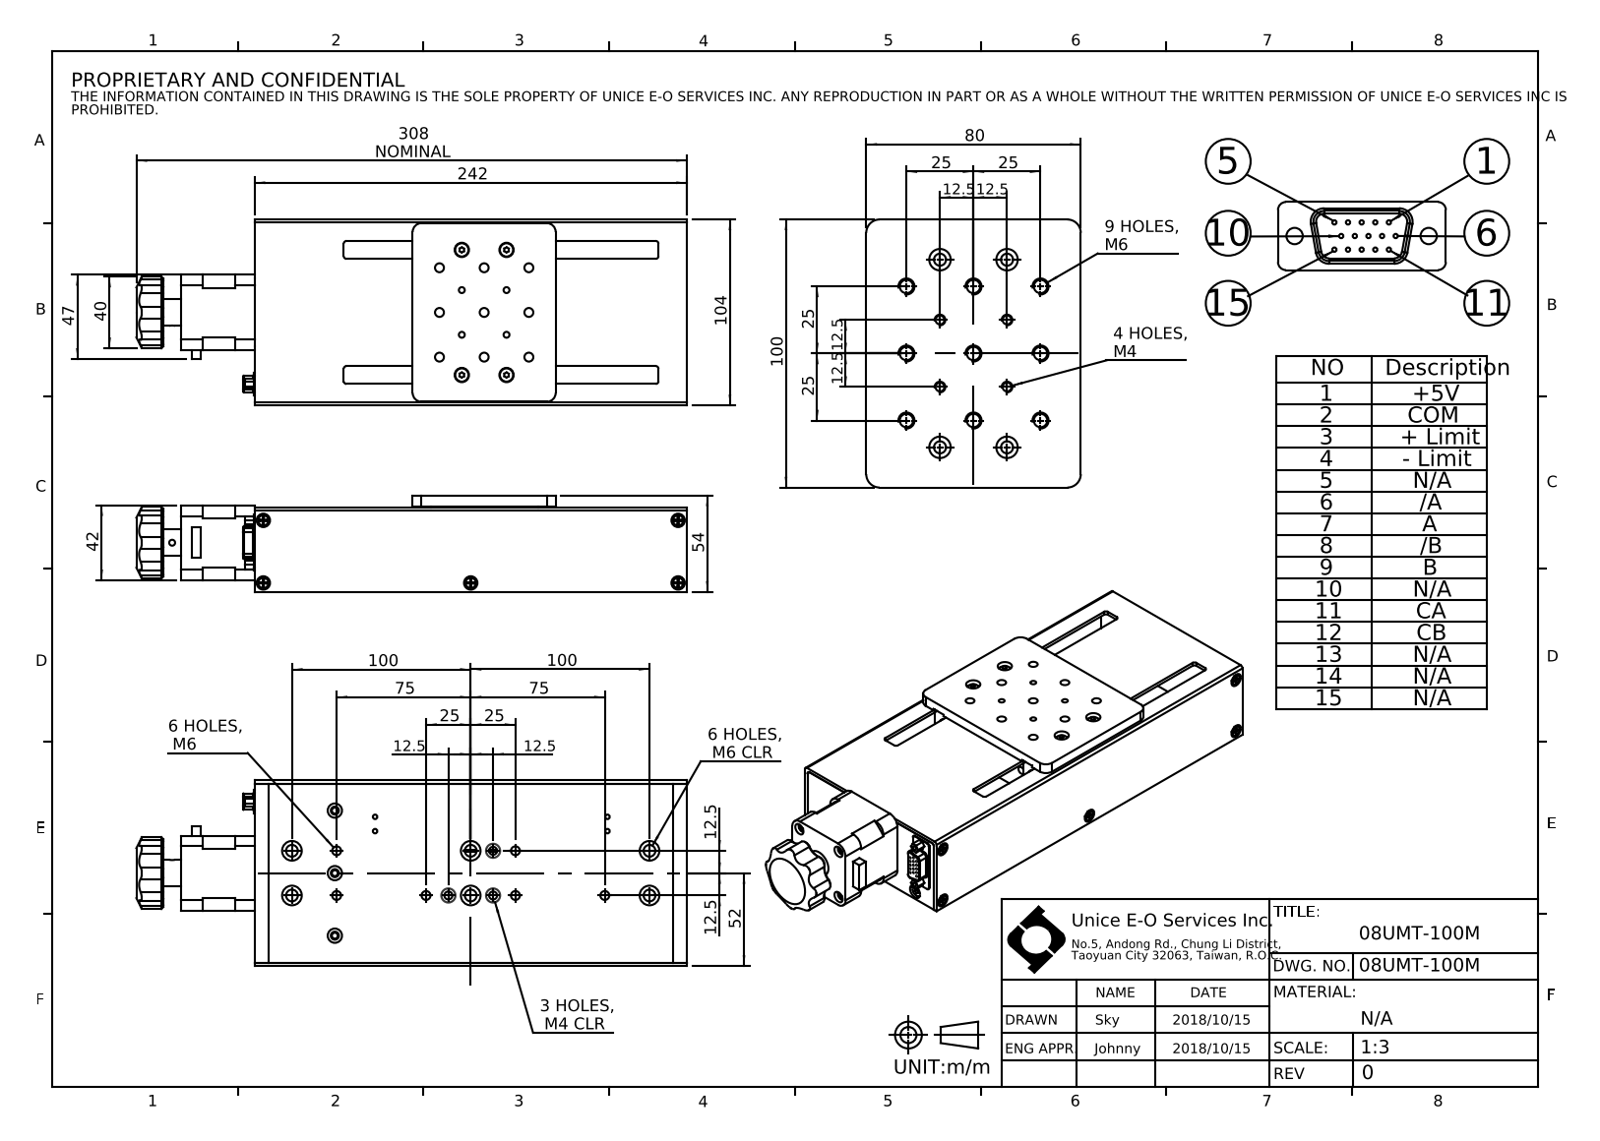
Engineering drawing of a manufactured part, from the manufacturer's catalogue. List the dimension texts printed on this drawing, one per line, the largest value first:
308 NOMINAL
242
104
100
100
100
80
75
75
54
52
47
42
40
25
25
25
25
25
25
12.5
12.5
12.5
12.5
12.5
12.5
12.5
12.5
9 HOLES, M 6
6 HOLES, M6
6 HOLES, M6 CLR
4 HOLES, M 4
3 HOLES, M4 CLR
